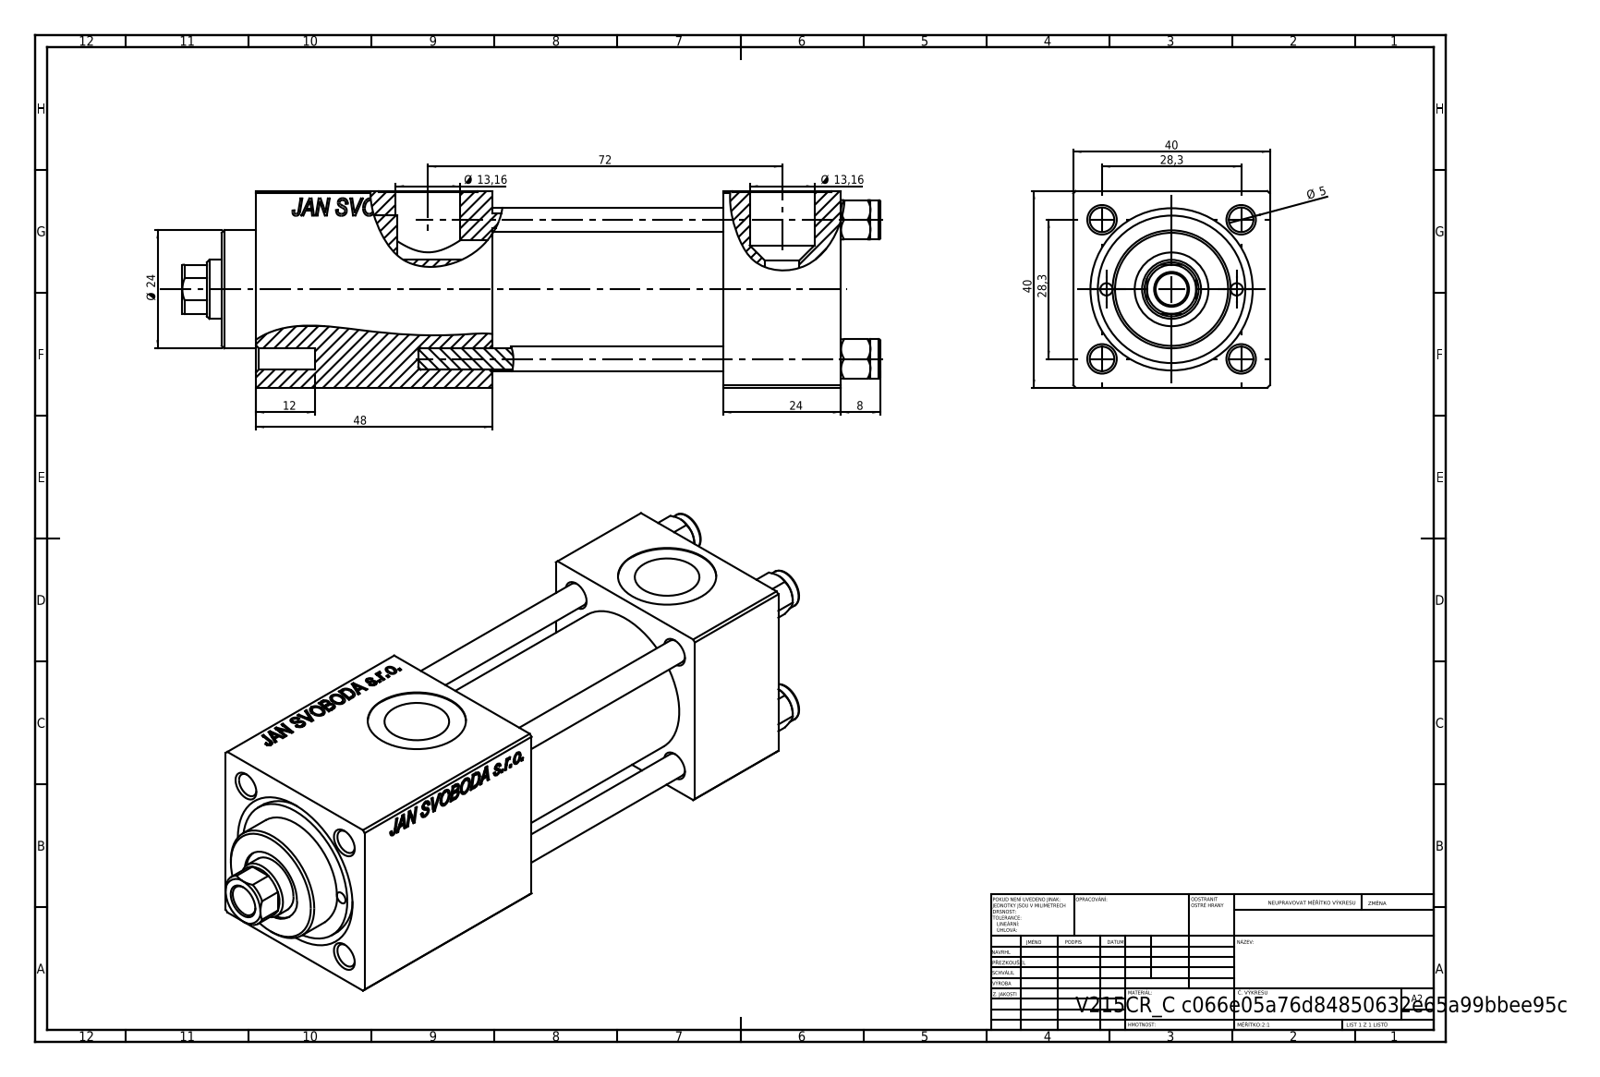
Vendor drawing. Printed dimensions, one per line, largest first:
72
48
40
40
28,3
28,3
24
Ø 24
Ø 13,16
Ø 13,16
12
8
Ø 5
